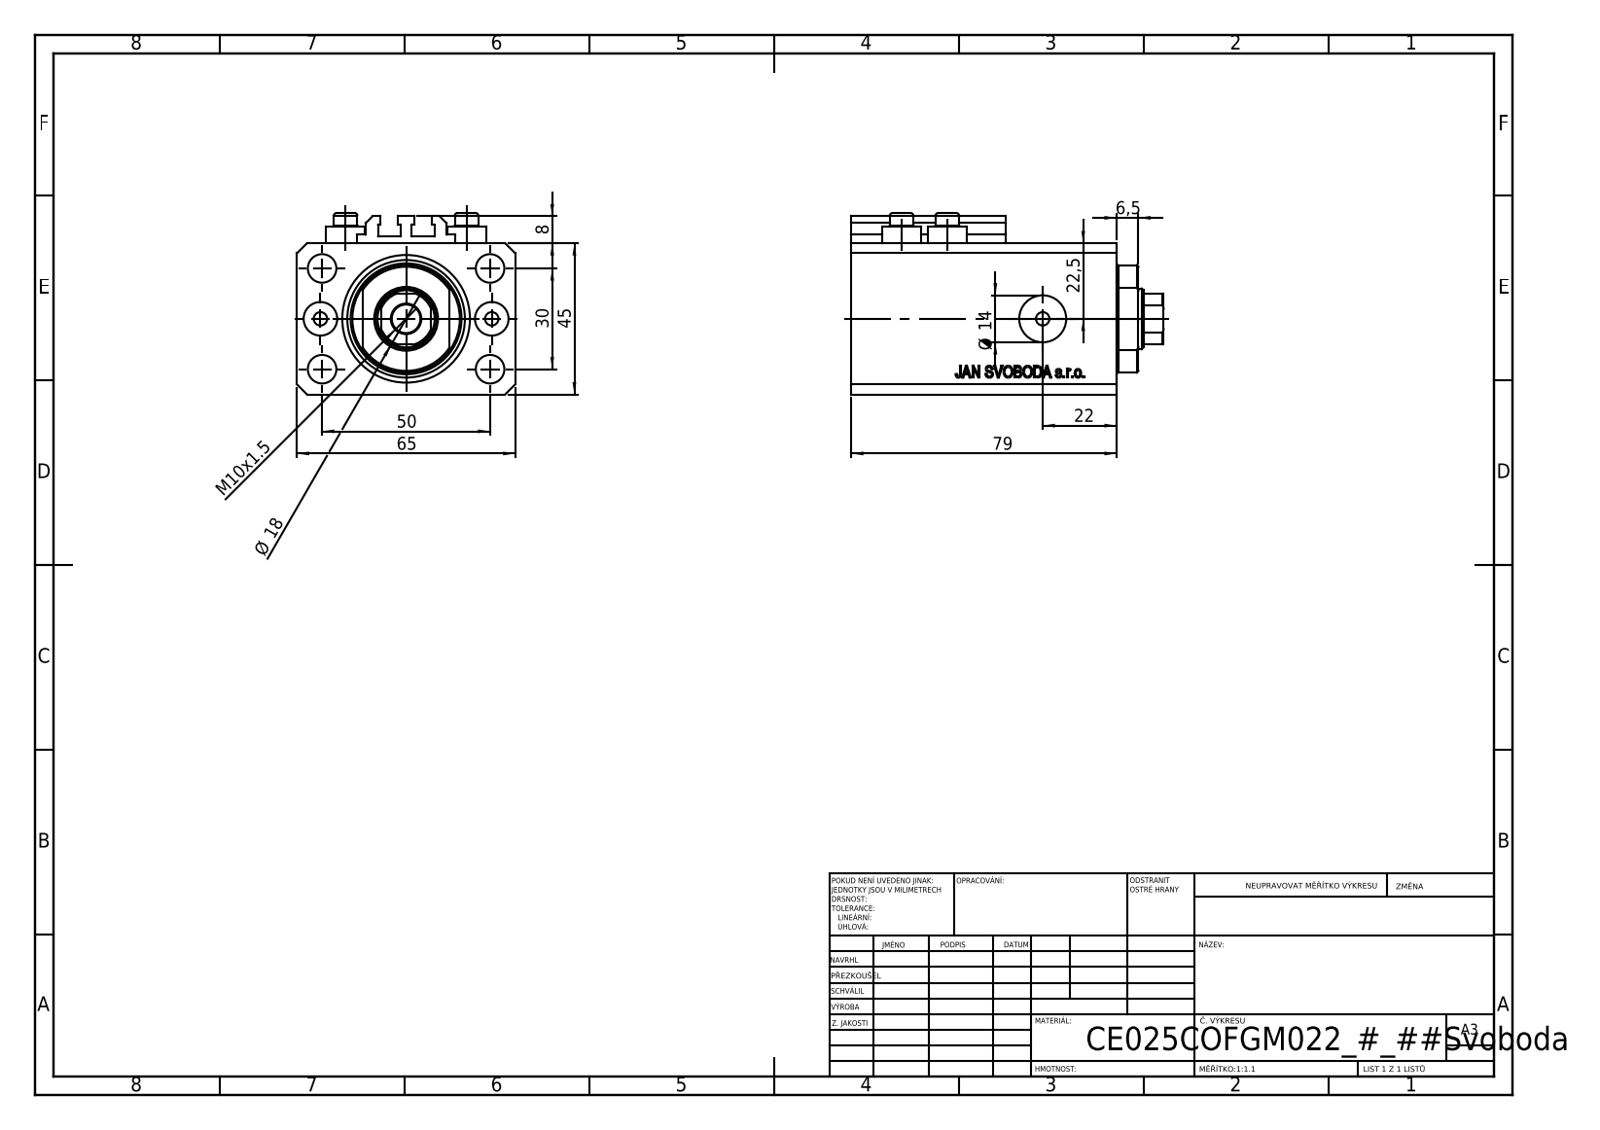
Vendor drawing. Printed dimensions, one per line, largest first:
79
65
50
45
30
22,5
22
Ø 18
Ø 14
M10x1.5
8
6,5
